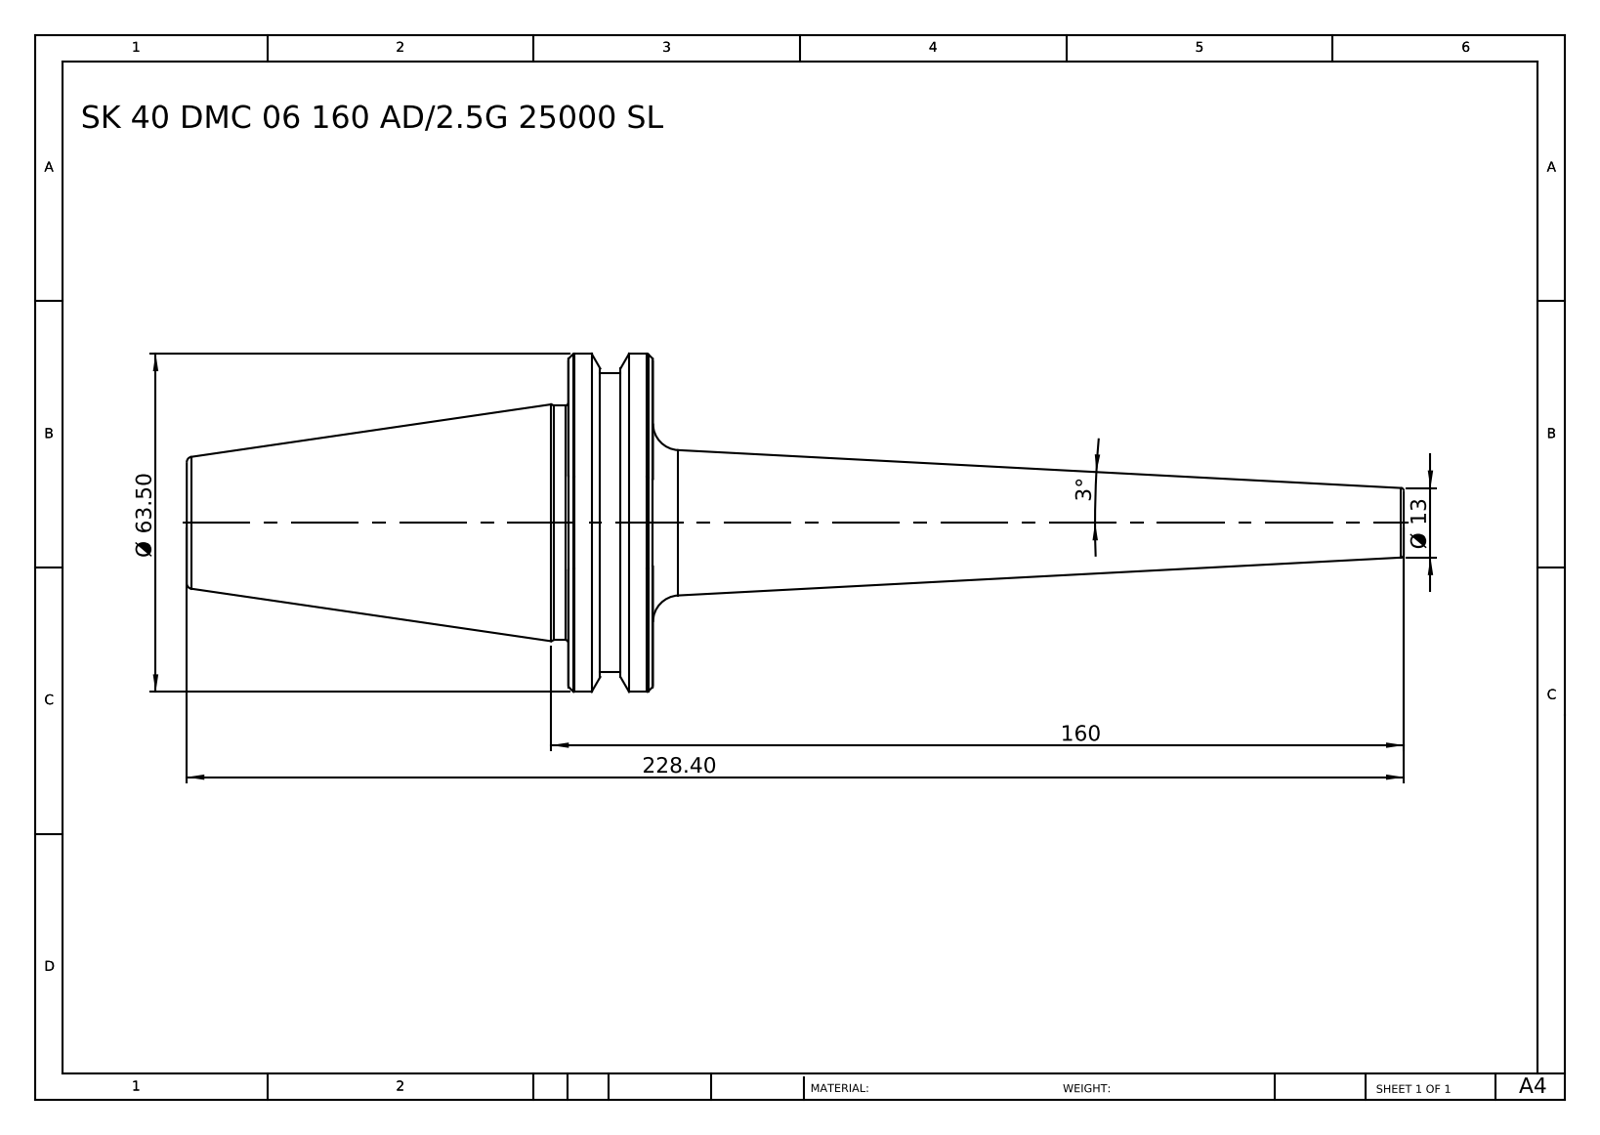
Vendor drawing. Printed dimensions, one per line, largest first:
228.40
160
Ø 63.50
Ø 13
3°
